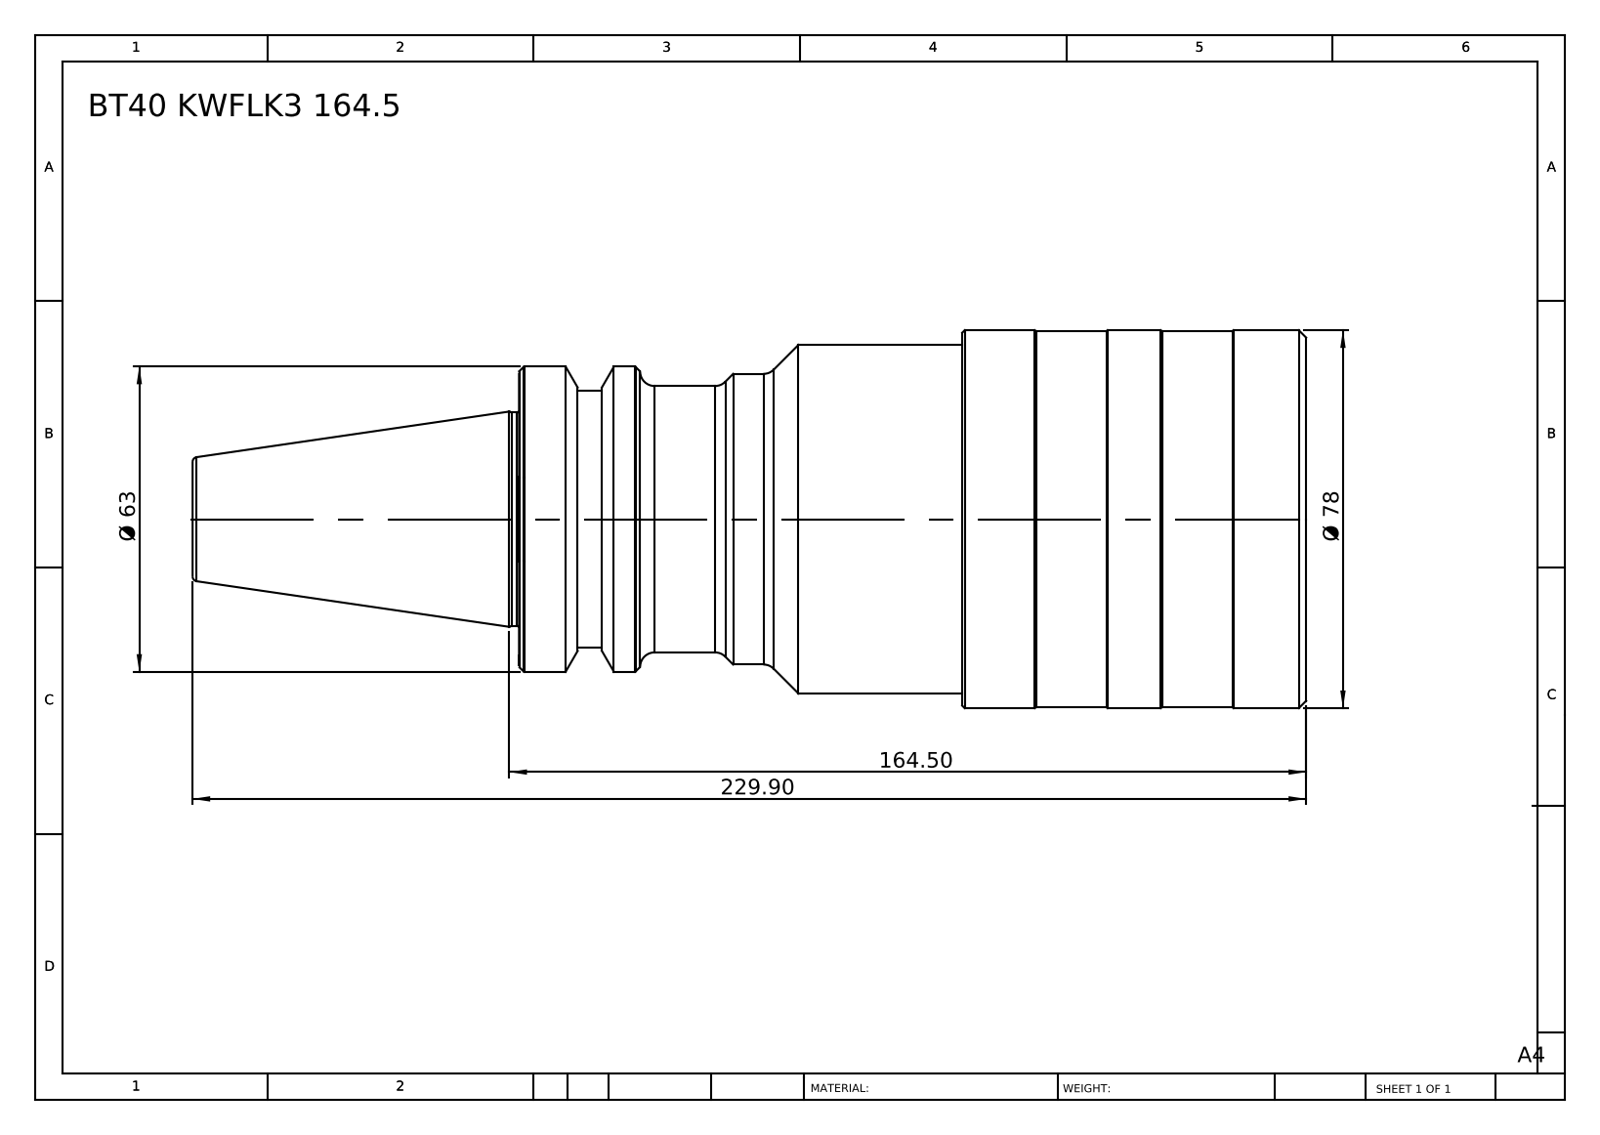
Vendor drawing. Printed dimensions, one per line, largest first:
229.90
164.50
Ø 78
Ø 63
